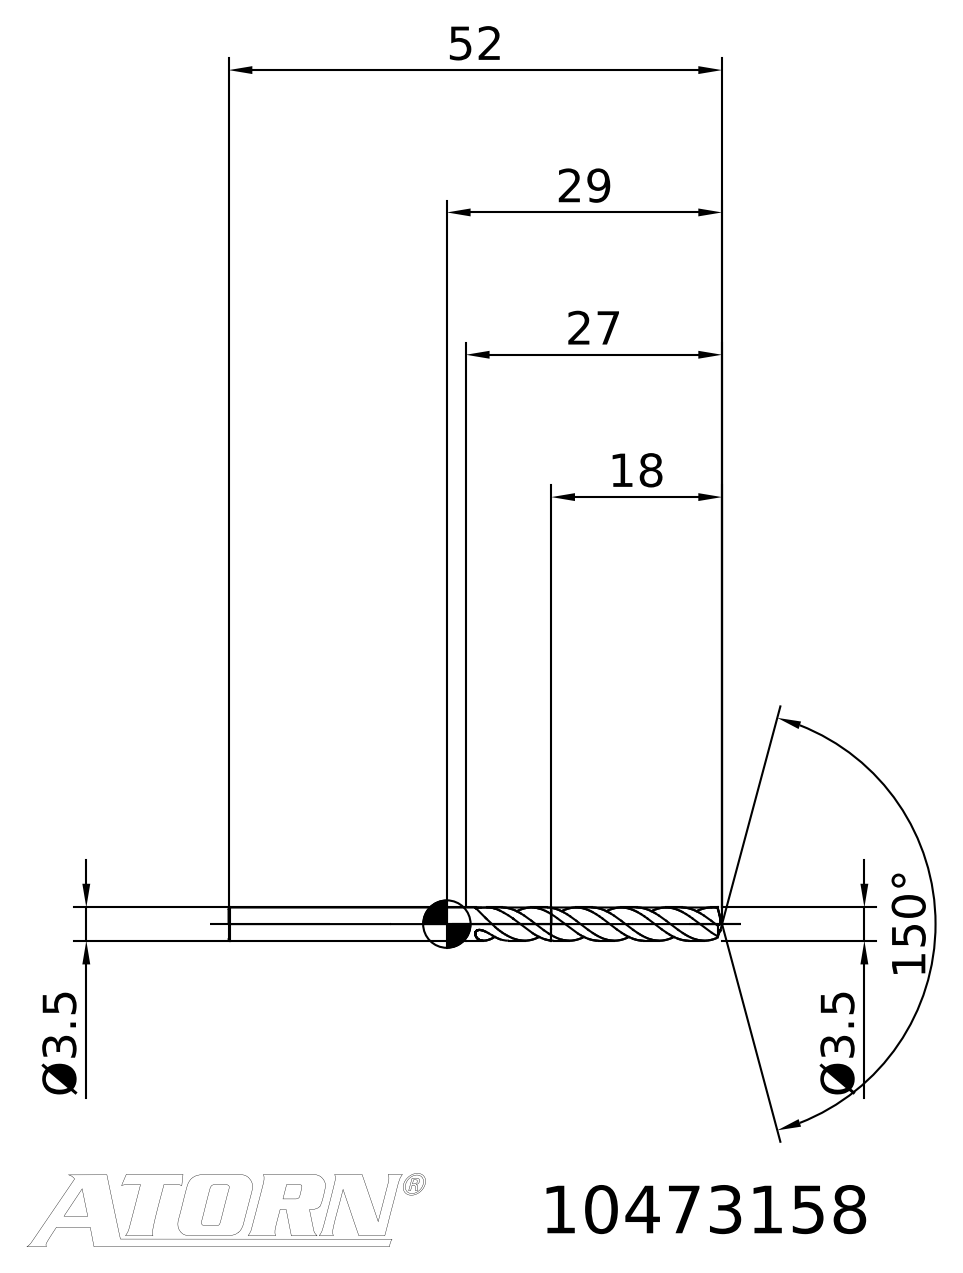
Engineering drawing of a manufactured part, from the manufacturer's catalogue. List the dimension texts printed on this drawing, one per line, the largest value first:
150°
52
29
27
18
Ø3.5
Ø3.5
